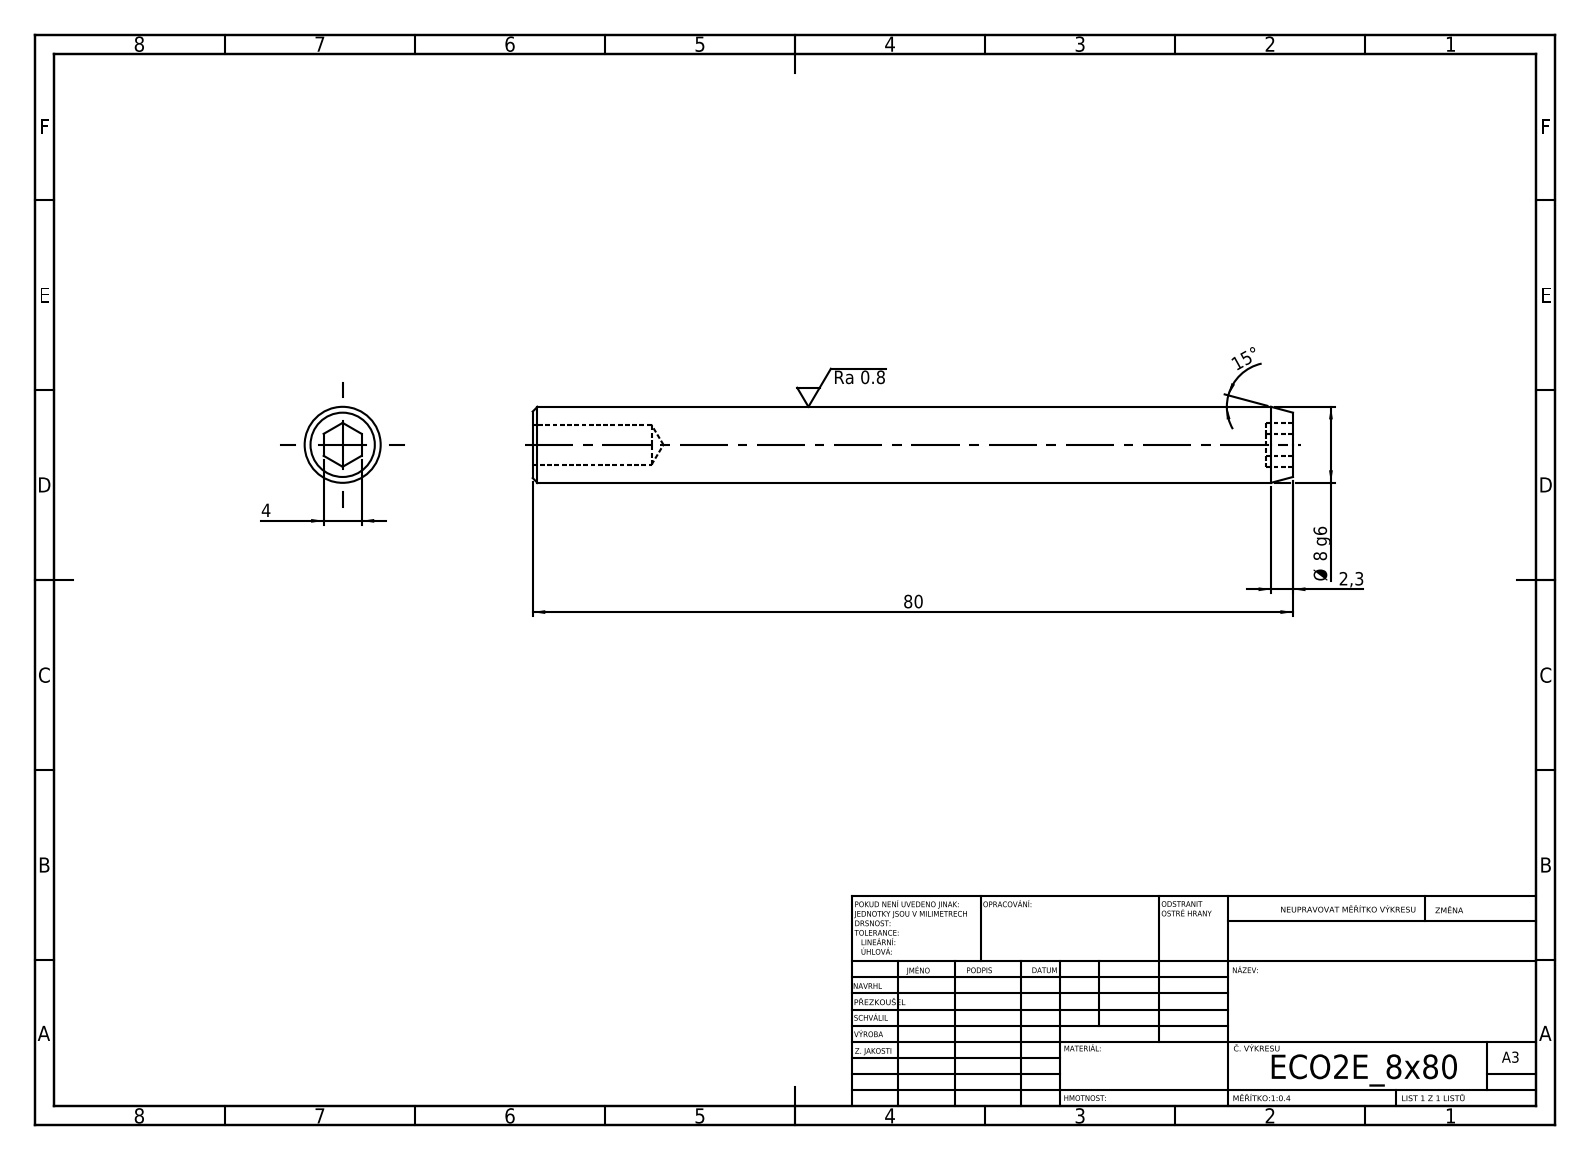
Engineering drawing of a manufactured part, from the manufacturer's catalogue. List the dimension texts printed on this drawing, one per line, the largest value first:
80
15°
Ø 8 g6
4
2,3
